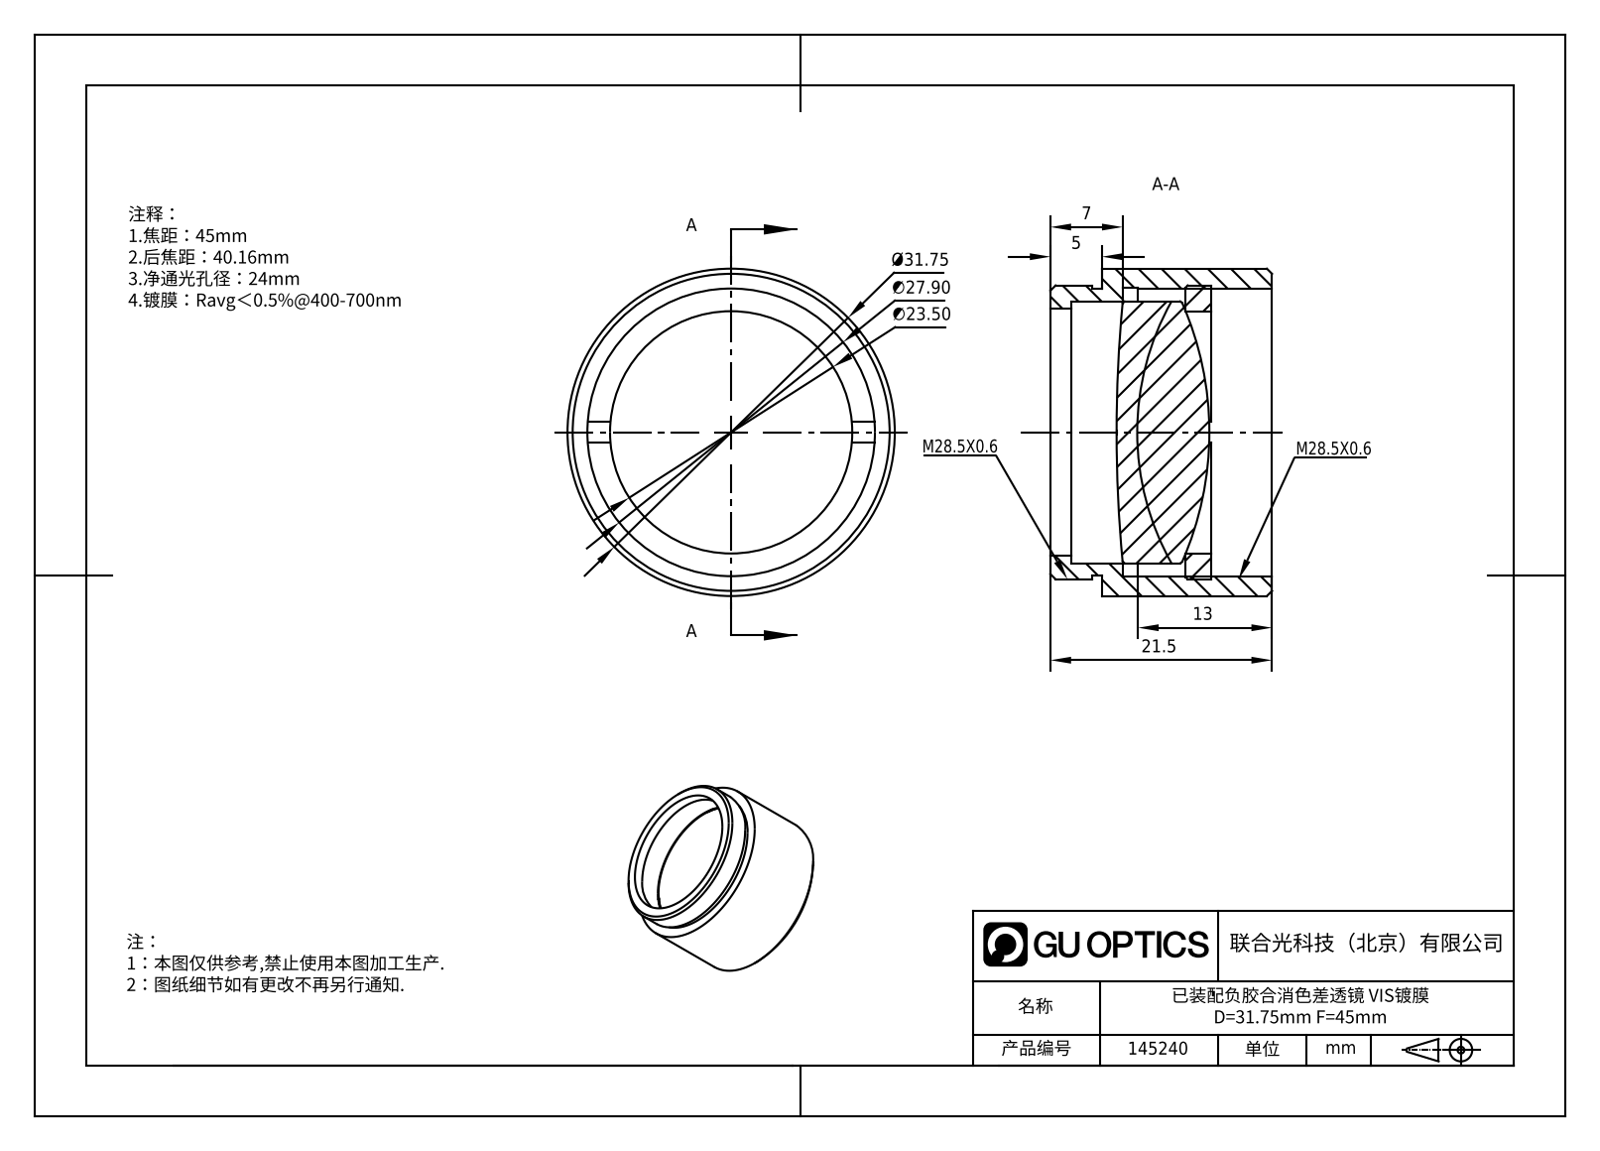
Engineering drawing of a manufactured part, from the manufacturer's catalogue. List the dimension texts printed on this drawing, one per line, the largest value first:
Ø31.75
∅27.90
∅23.50
21.5
13
7
5
